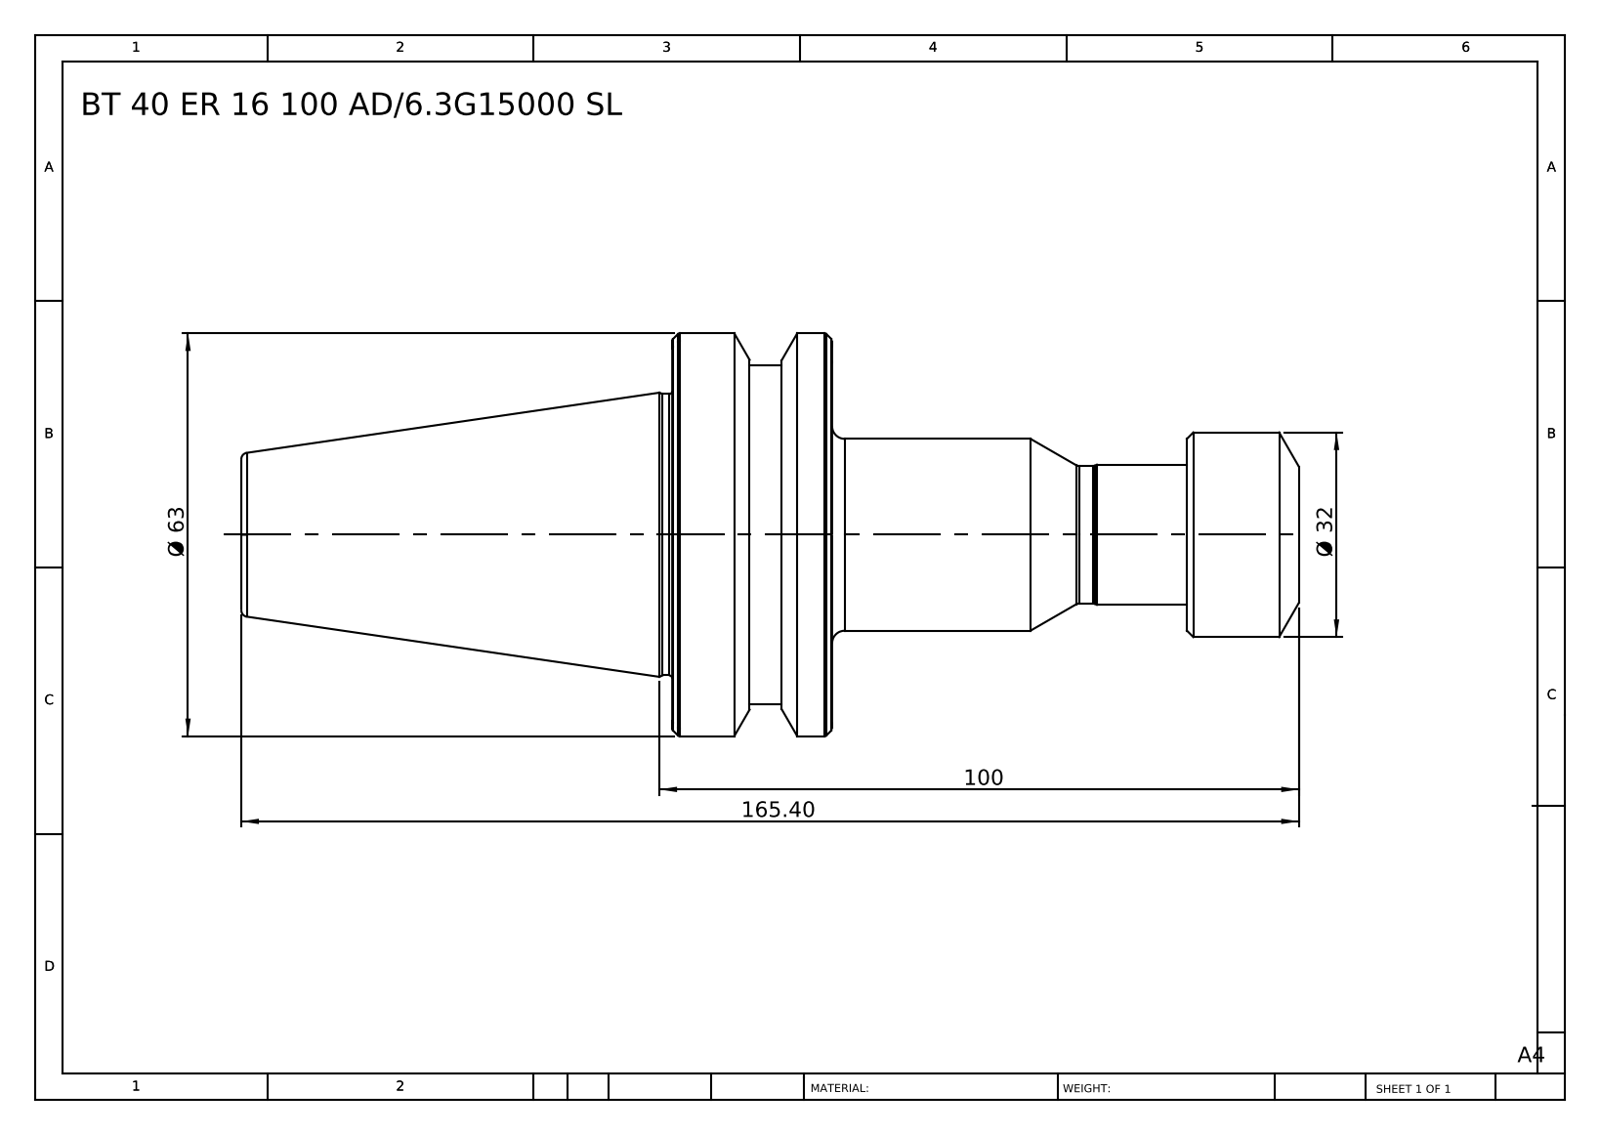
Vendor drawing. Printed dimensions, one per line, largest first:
165.40
100
Ø 63
Ø 32
